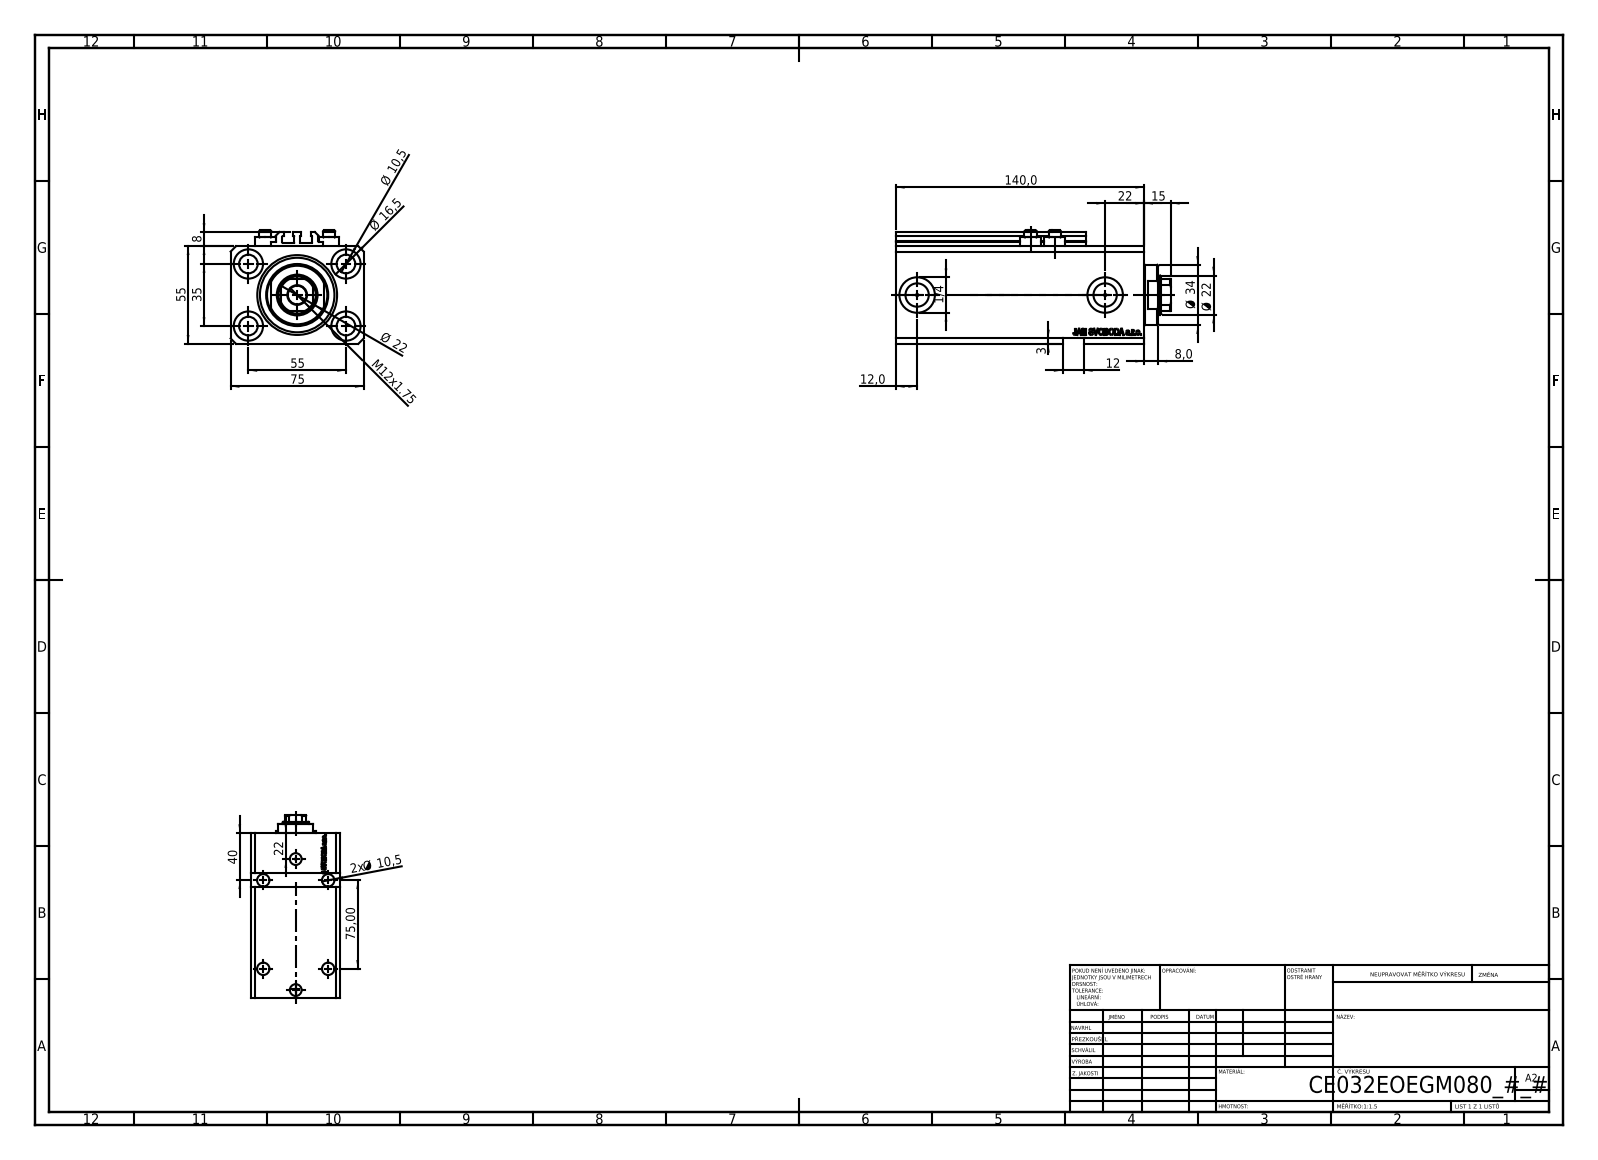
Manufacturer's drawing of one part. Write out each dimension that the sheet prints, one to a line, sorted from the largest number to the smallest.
140,0
75
75,00
55
55
40
35
Ø 34
Ø 22
22
Ø 22
22
Ø 16,5
15
M12x1.75
12,0
12
Ø 10,5
2x Ø 10,5
8
8,0
3
1/4
